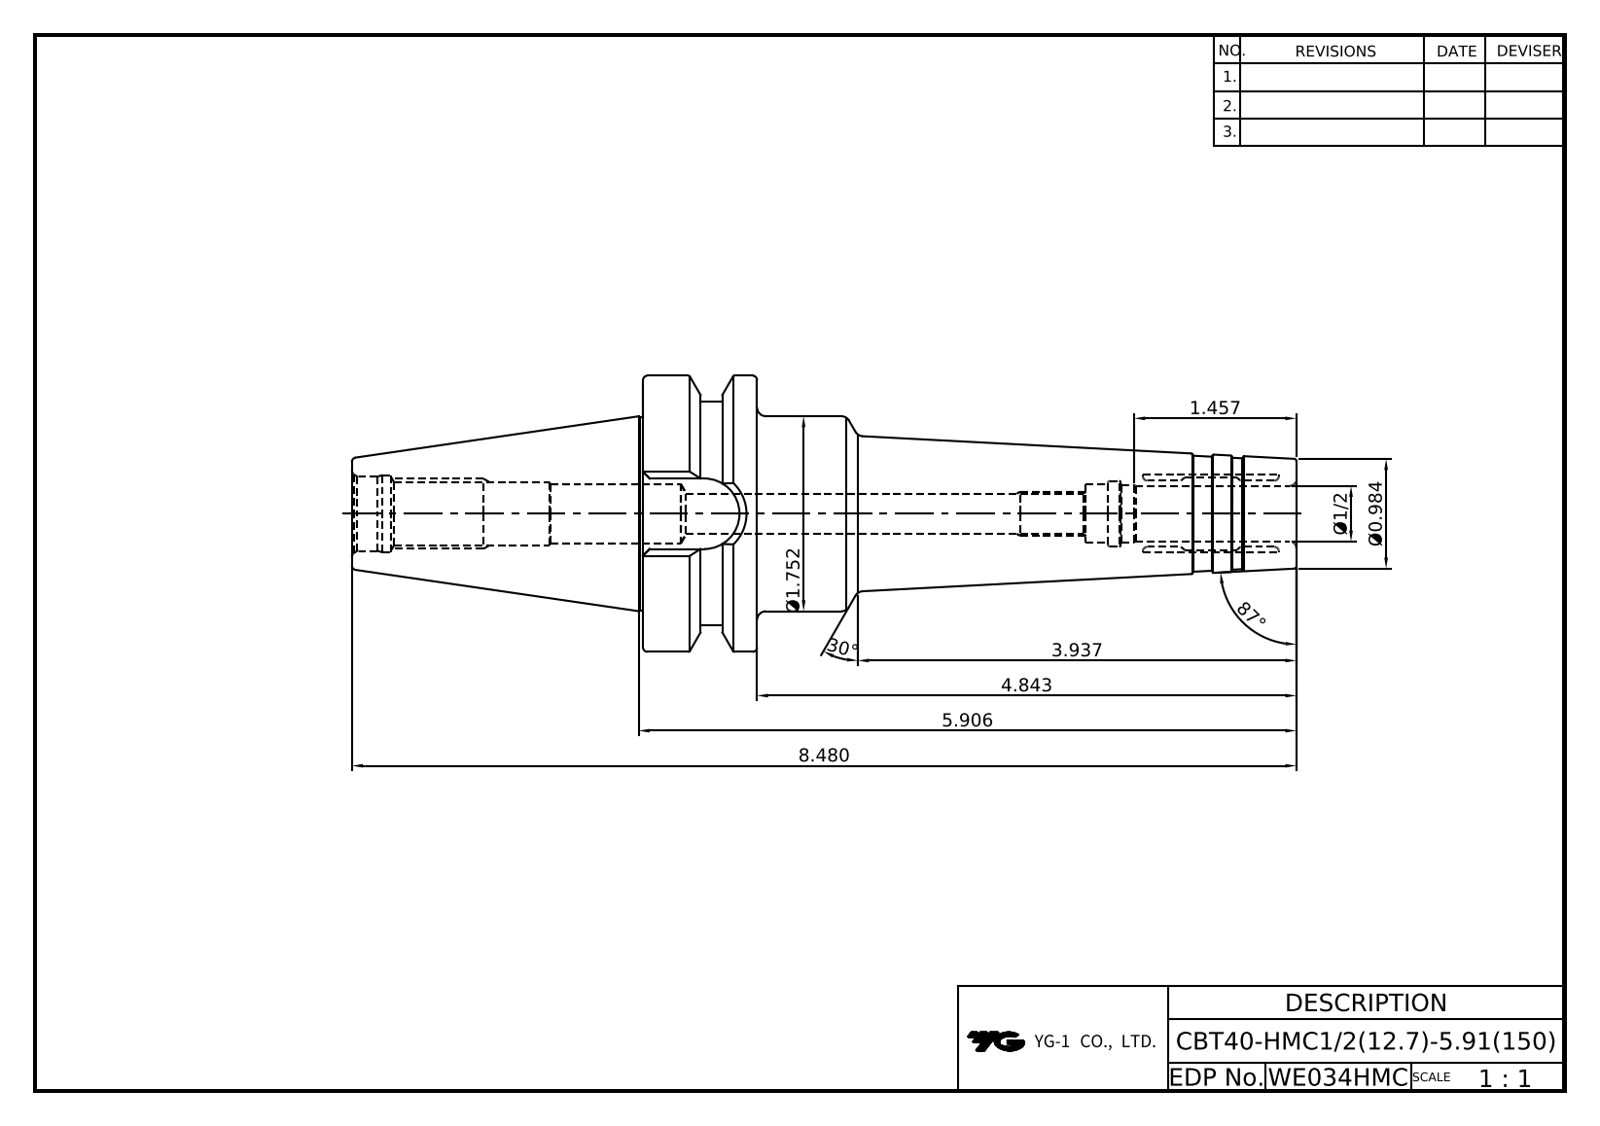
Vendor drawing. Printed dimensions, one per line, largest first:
87°
30°
8.480
5.906
4.843
3.937
Ø1.752
1.457
Ø0.984
Ø1/2
